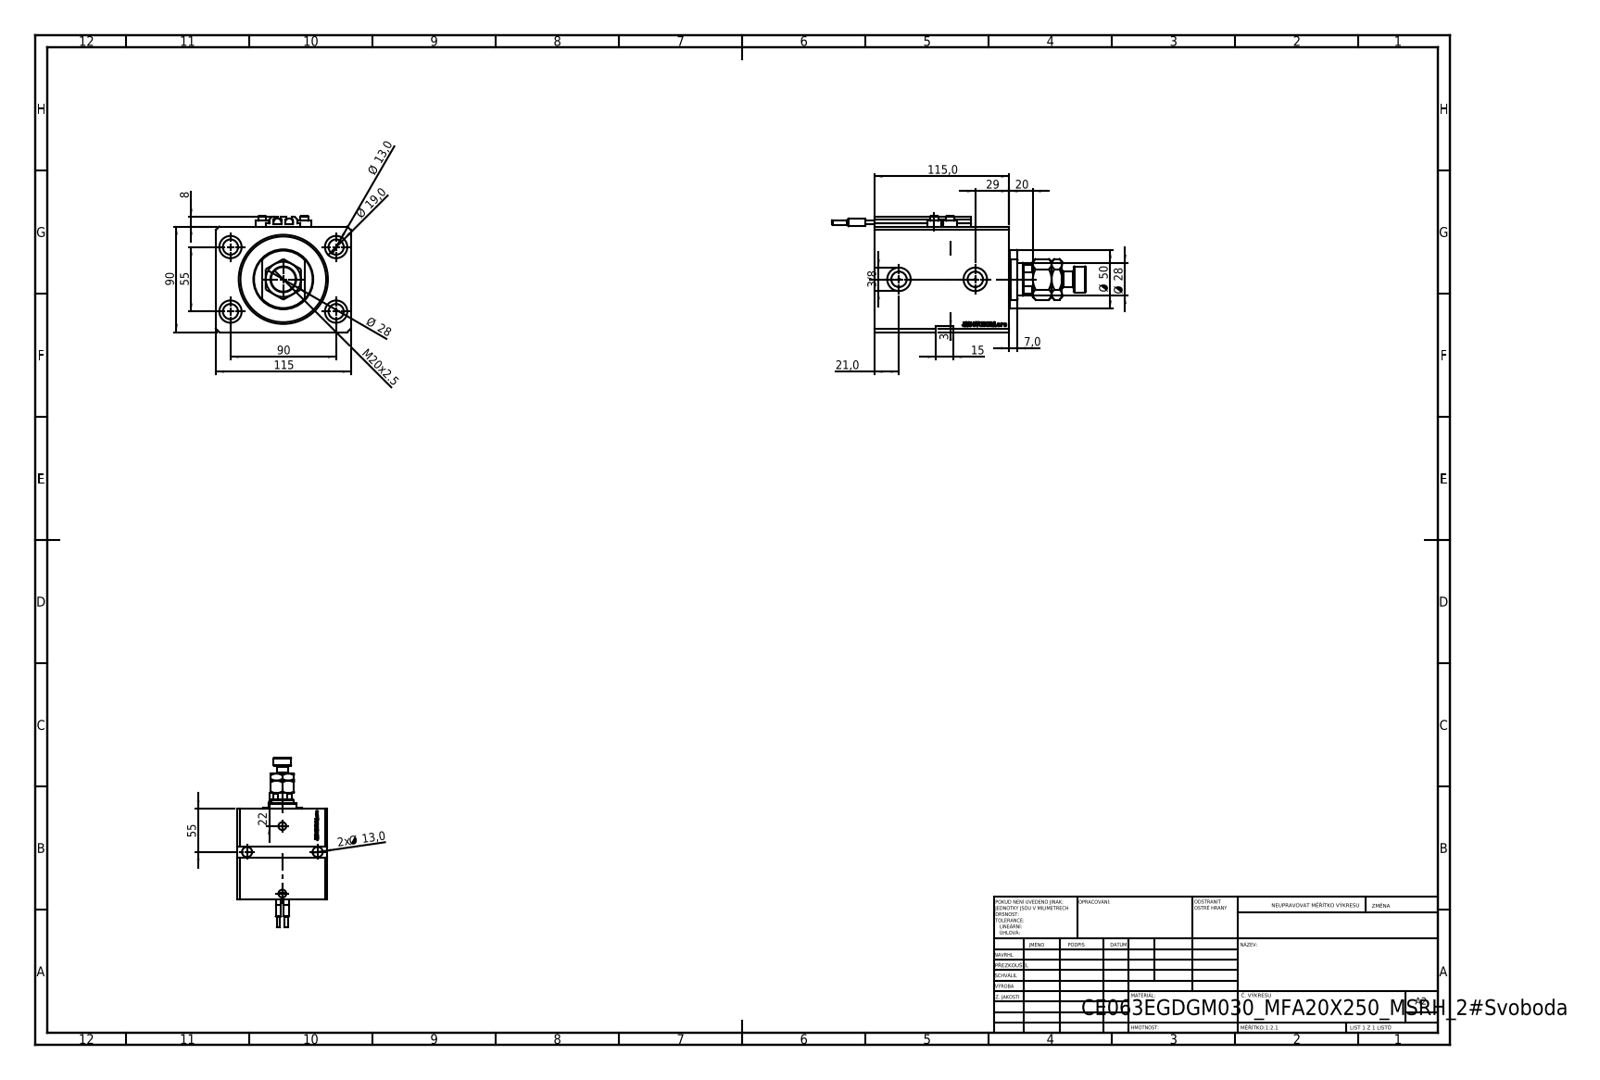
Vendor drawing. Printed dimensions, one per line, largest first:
115
115,0
90
90
55
55
Ø 50
29
Ø 28
Ø 28
22
21,0
M20x2.5
20
Ø 19,0
15
Ø 13,0
2x Ø 13,0
8
7,0
3
3/8
